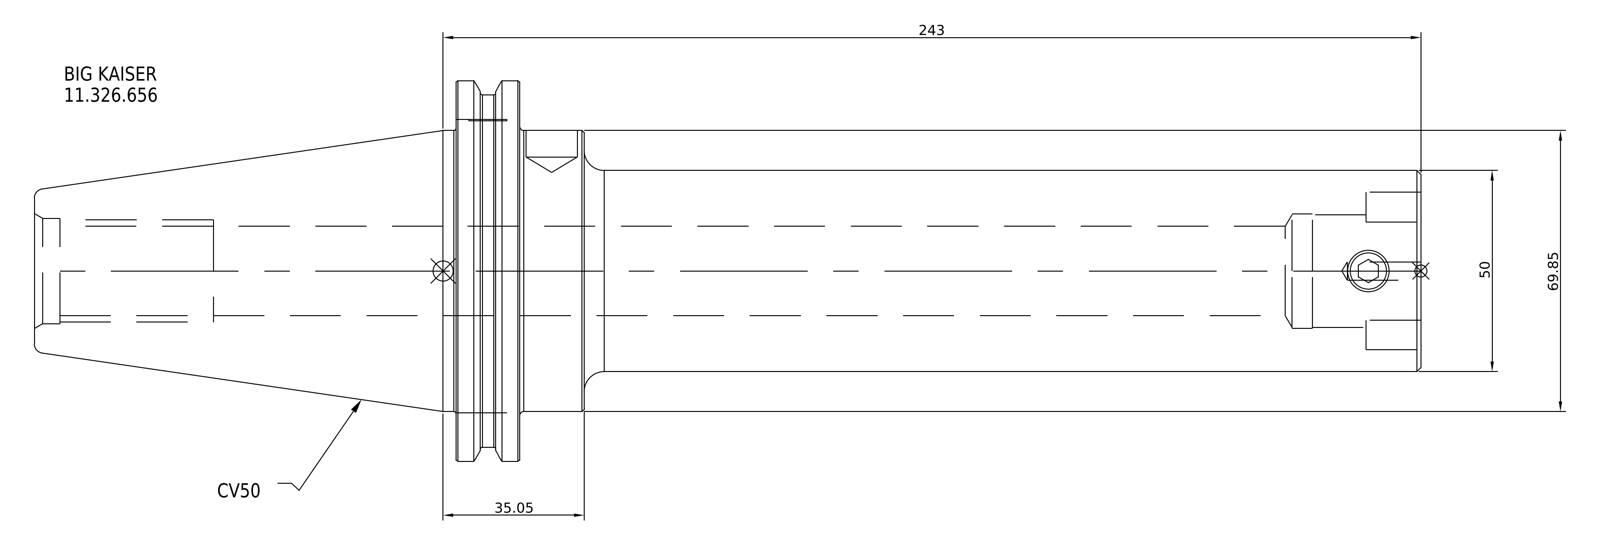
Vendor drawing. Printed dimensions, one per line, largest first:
243
69.85
50
35.05
